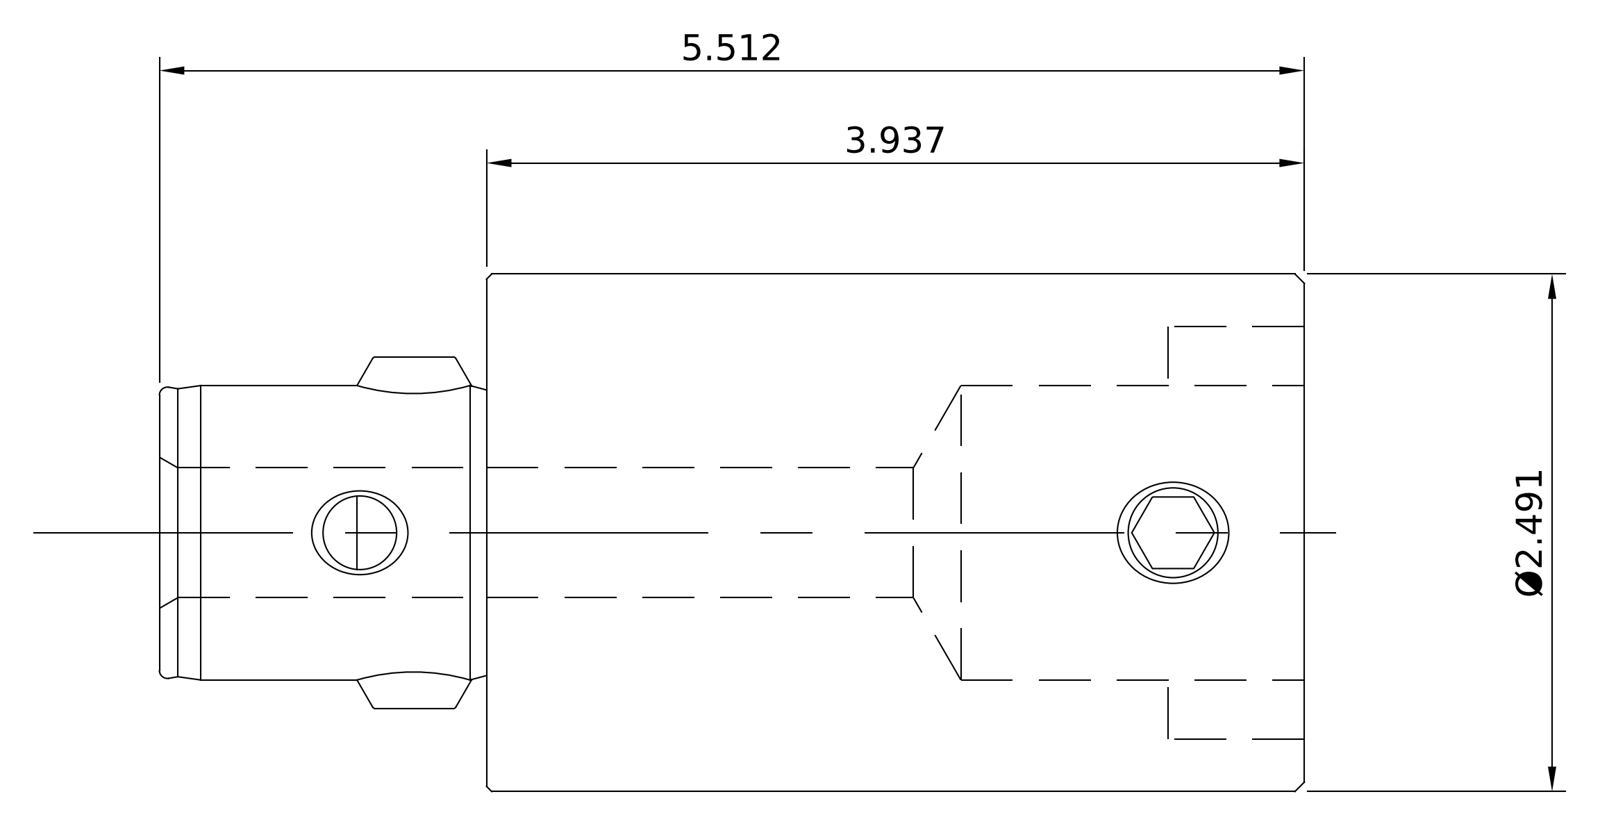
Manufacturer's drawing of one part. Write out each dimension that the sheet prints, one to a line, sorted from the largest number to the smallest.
5.512
3.937
Ø2.491
